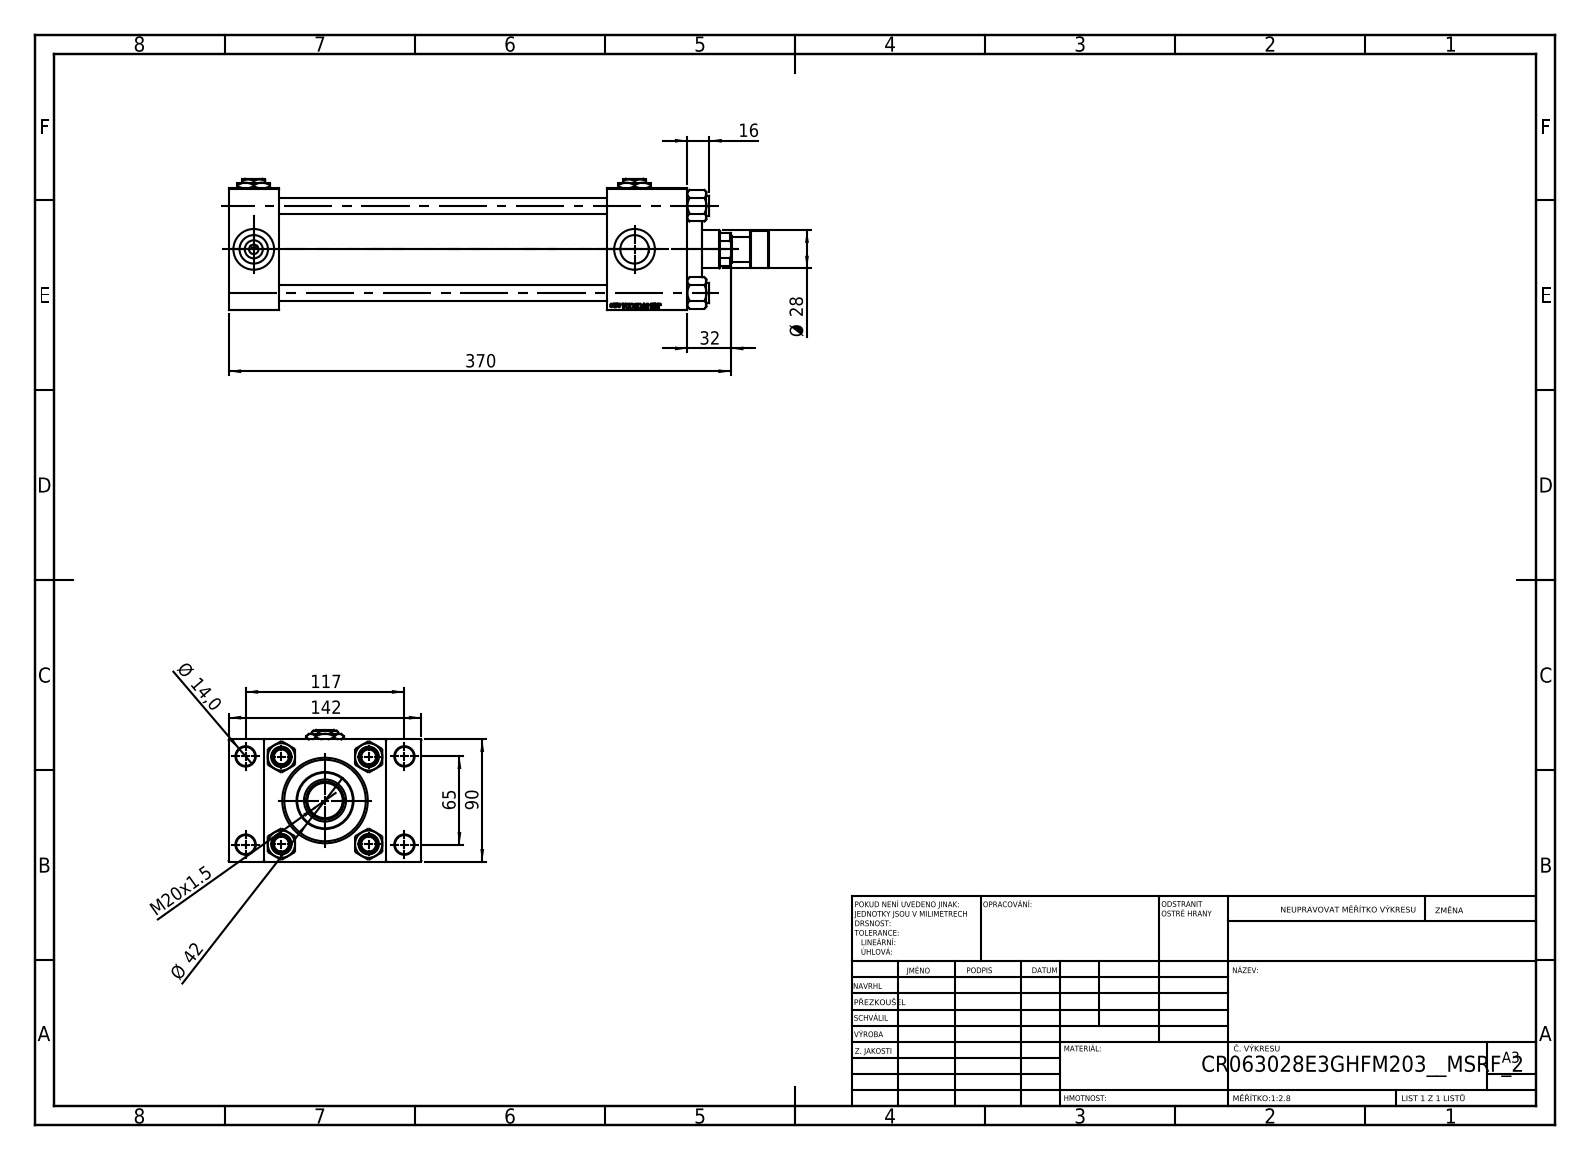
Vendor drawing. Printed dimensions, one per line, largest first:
370
142
117
90
65
Ø 42
32
Ø 28
M20x1.5
16
Ø 14,0
